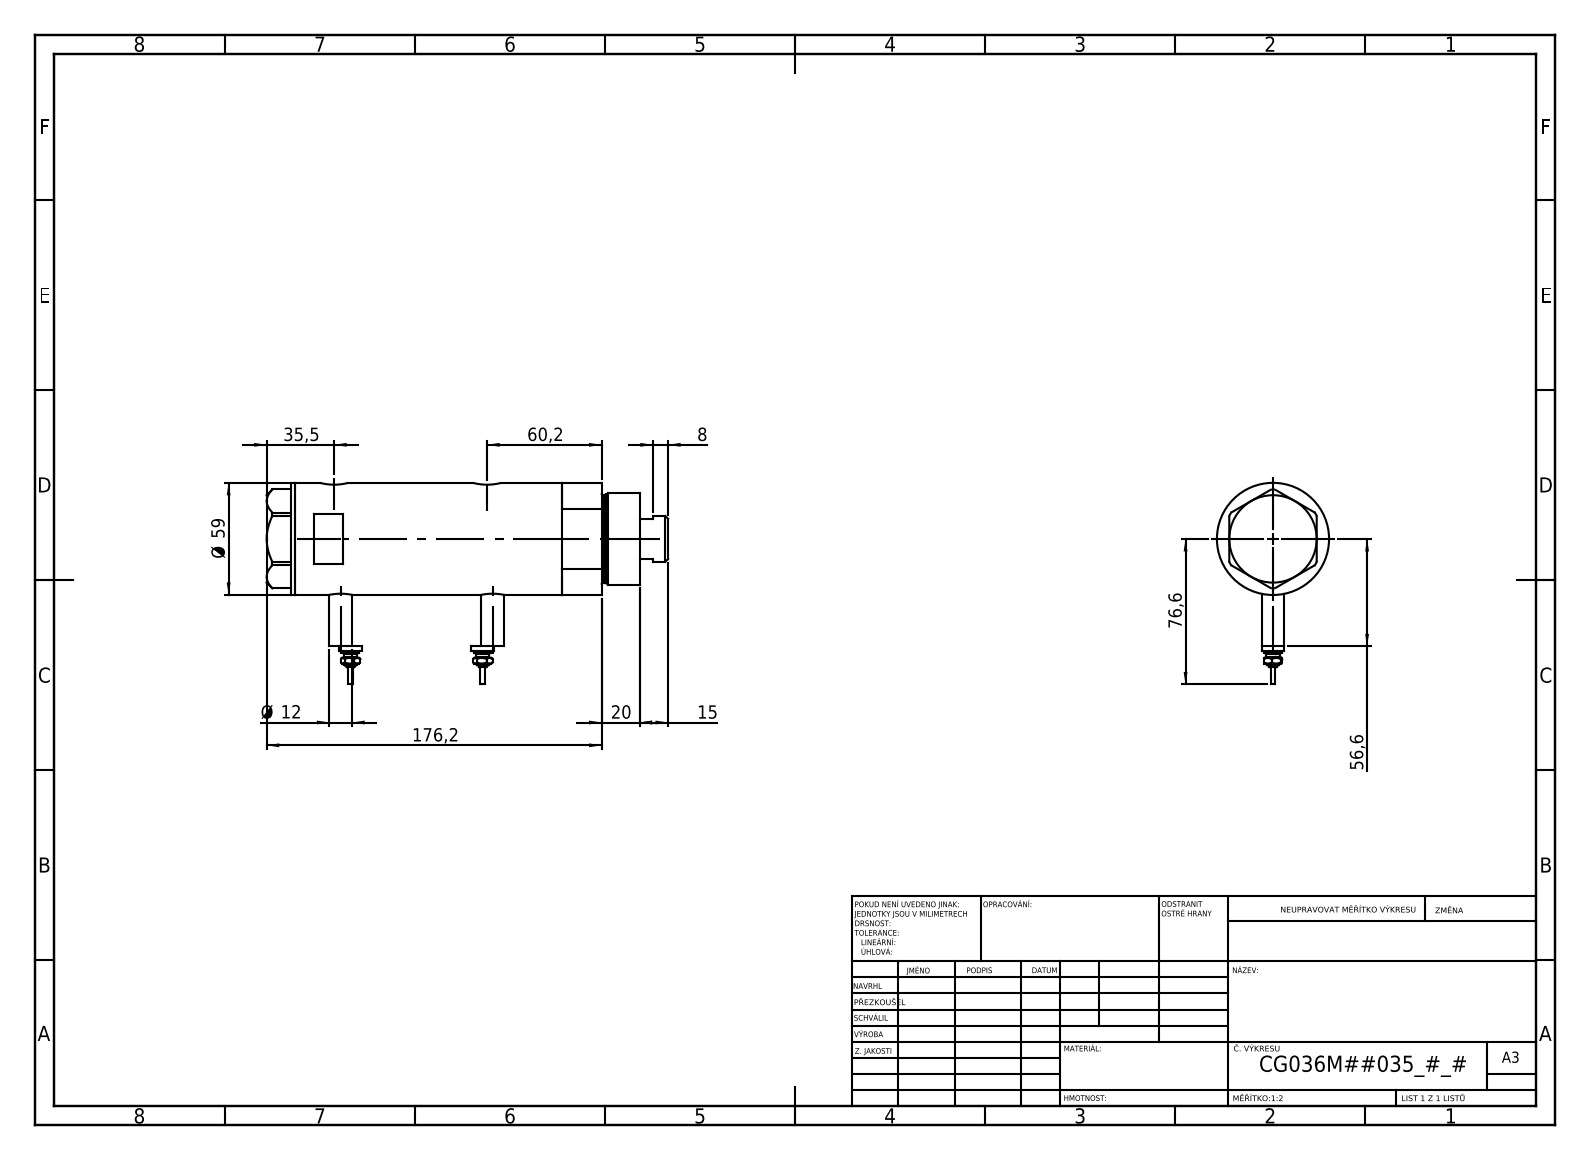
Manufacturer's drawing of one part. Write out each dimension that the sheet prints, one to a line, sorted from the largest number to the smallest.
176,2
76,6
60,2
Ø 59
56,6
35,5
20
15
Ø 12
8
